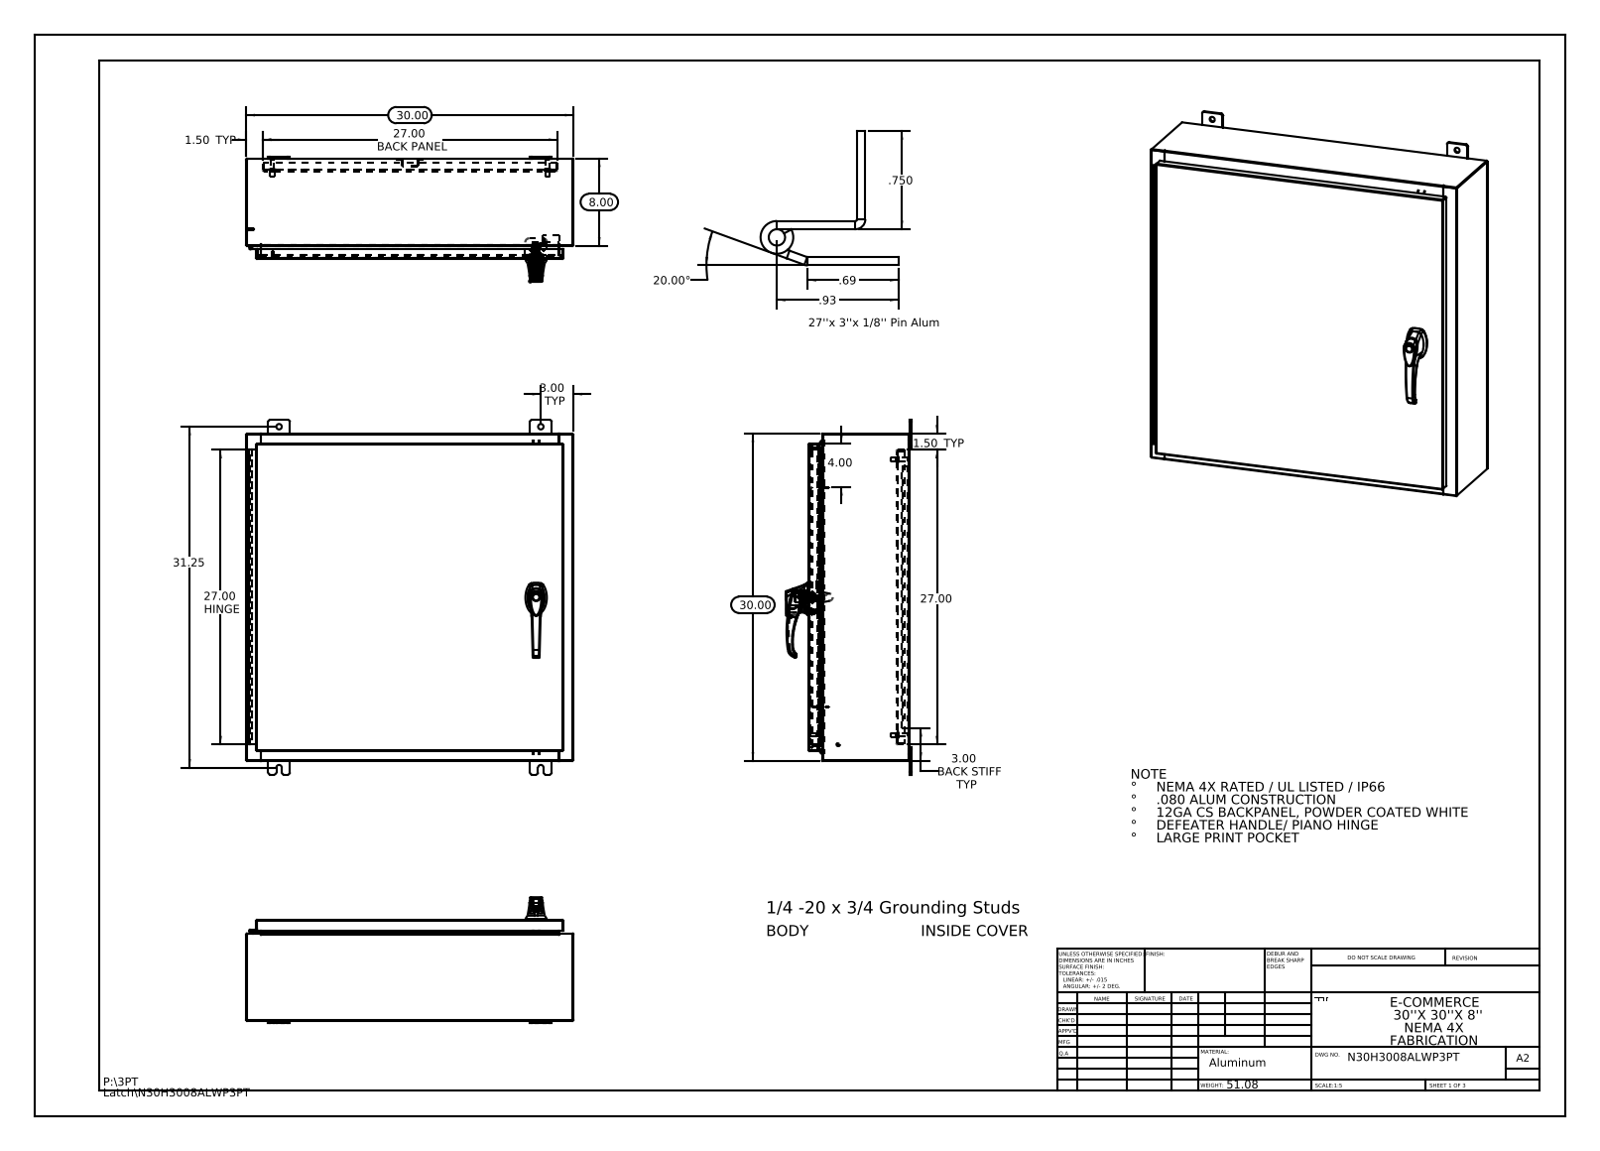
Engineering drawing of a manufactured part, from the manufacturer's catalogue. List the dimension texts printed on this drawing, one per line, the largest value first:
31.25
30.00
30.00
27.00 HINGE
27.00 BACK PANEL
27.00
20.00°
8.00
4.00
3.00 TYP
3.00 BACK STIFF TYP
1.50 TYP
1.50 TYP
.93
.750
.69
